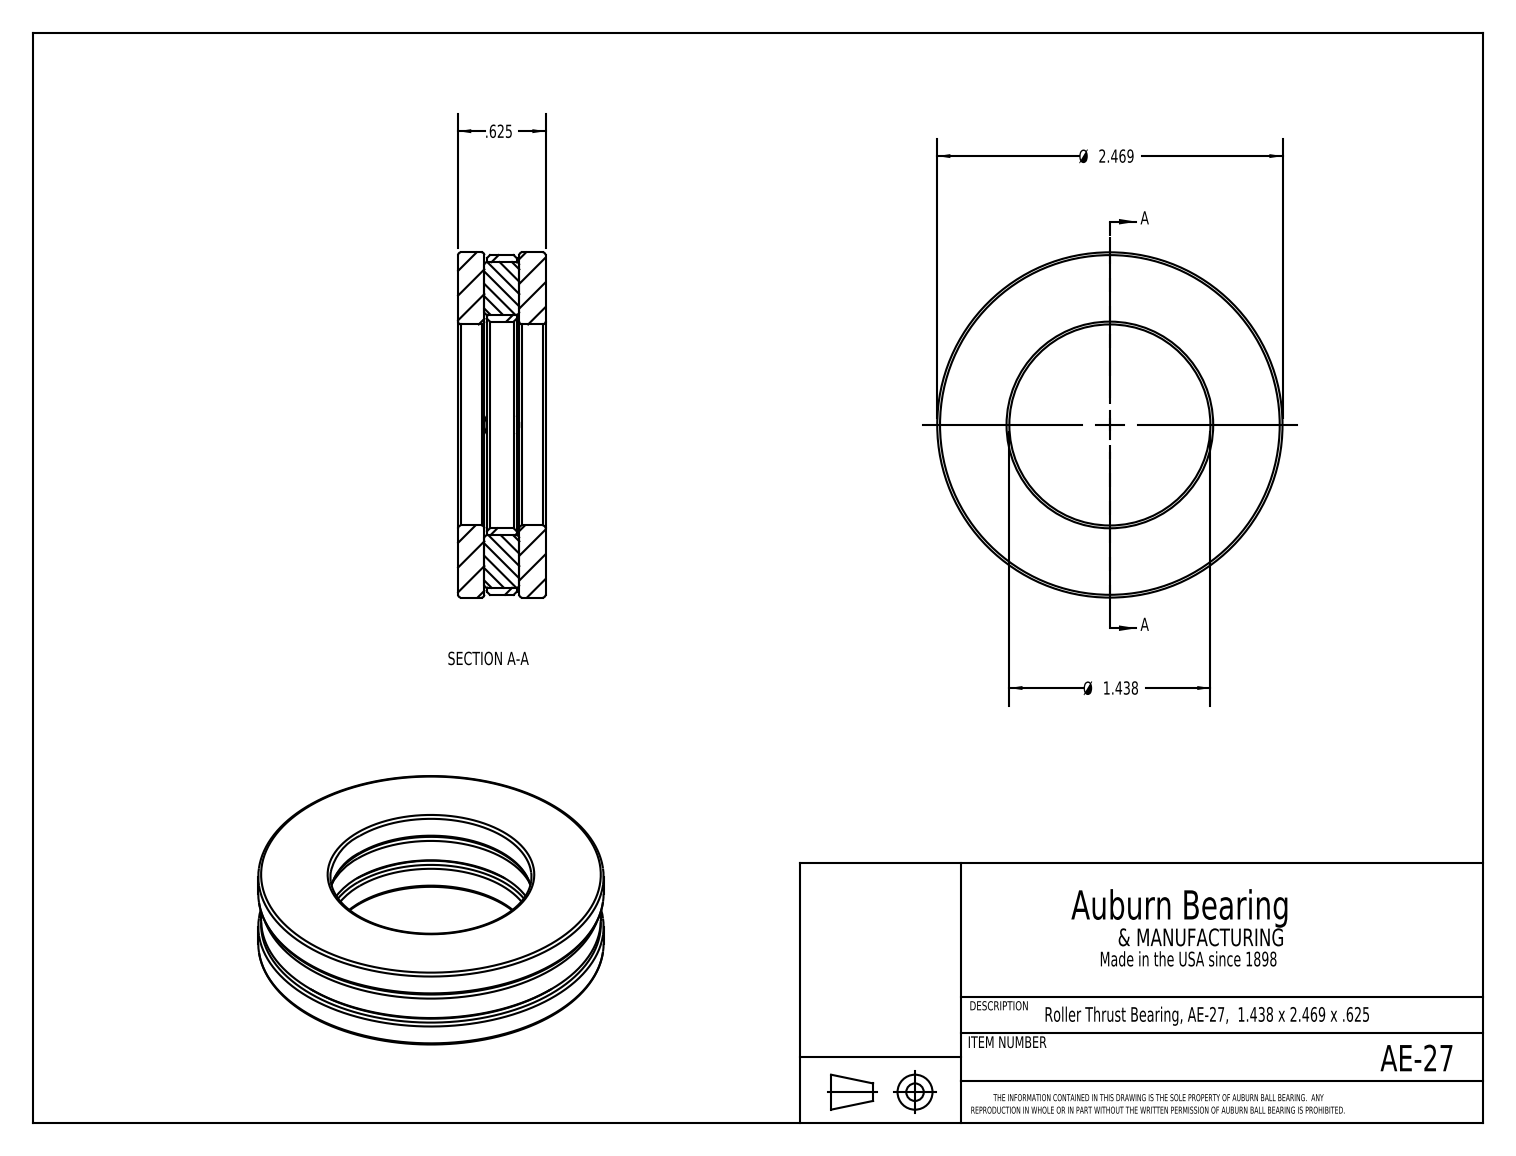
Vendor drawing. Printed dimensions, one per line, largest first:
Ø 2.469
Ø 1.438
.625
